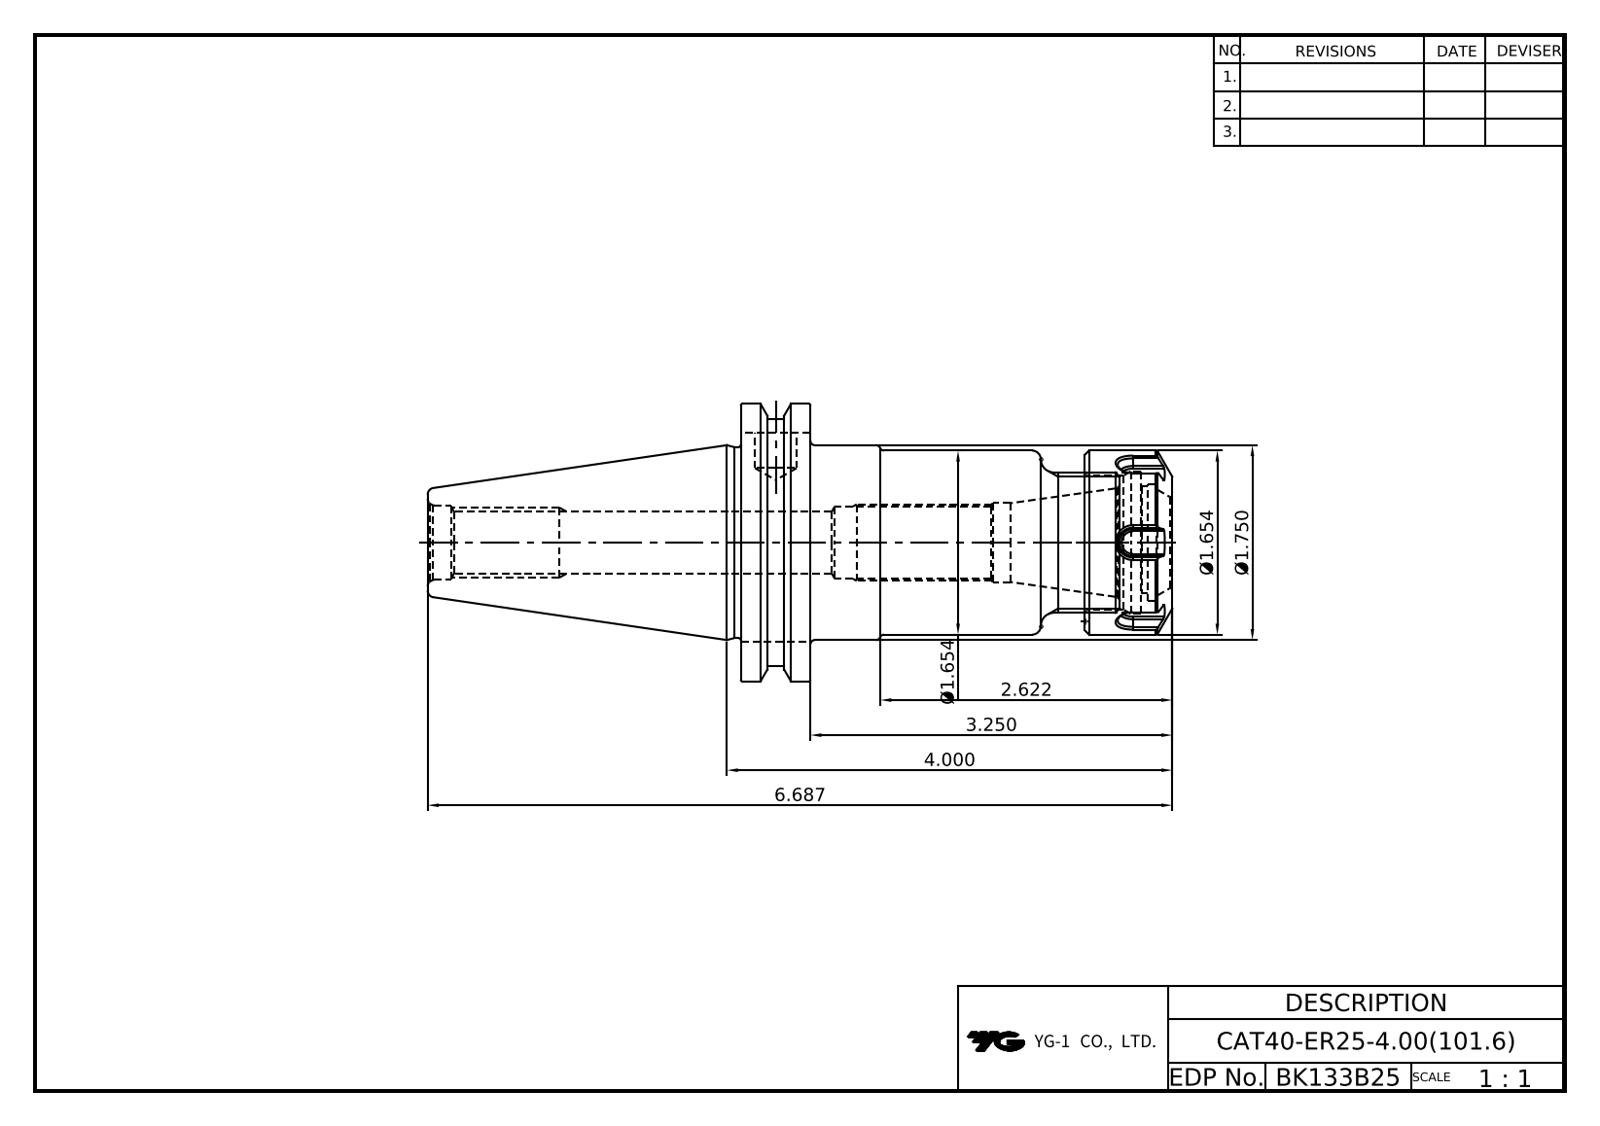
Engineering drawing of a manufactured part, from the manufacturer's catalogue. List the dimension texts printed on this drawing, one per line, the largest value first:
6.687
4.000
3.250
2.622
Ø1.750
Ø1.654
Ø1.654
